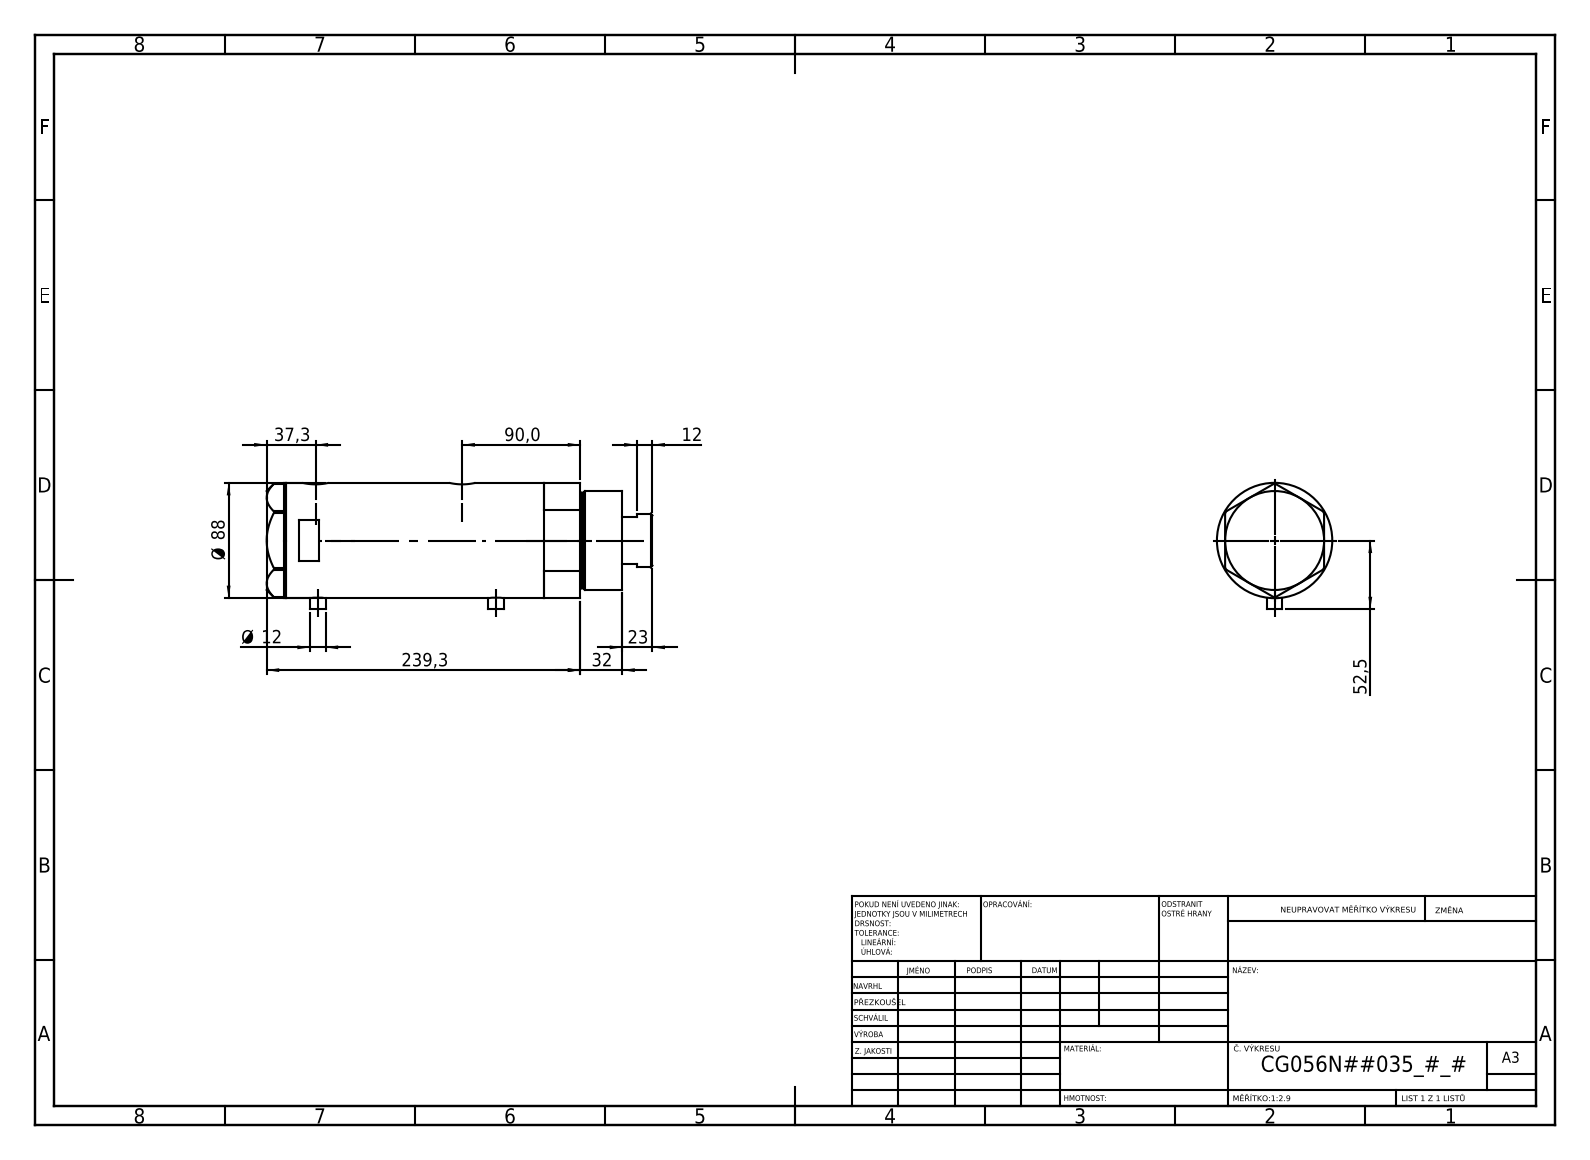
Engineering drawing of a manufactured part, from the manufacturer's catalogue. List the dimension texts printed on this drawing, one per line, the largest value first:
239,3
90,0
Ø 88
52,5
37,3
32
23
12
Ø 12
